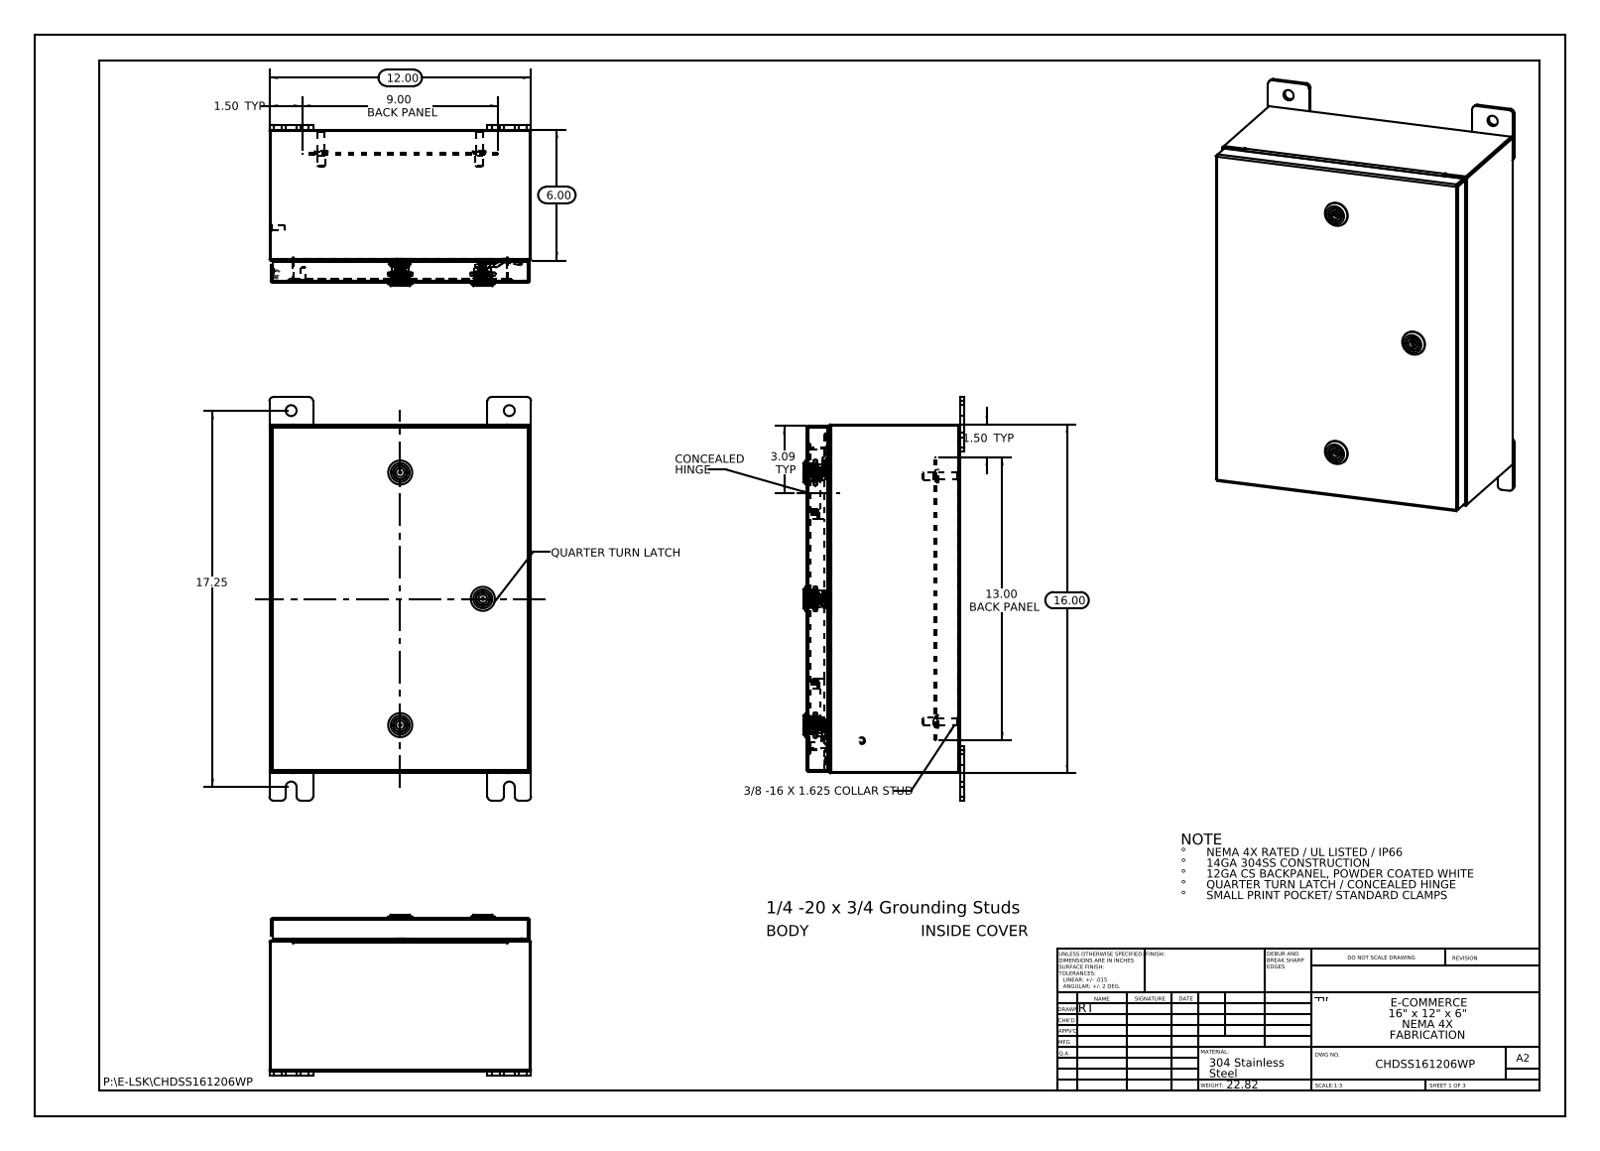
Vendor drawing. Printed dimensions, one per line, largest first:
17.25
16.00
13.00 BACK PANEL
12.00
9.00 BACK PANEL
6.00
3.09 TYP
1.50 TYP
1.50 TYP
